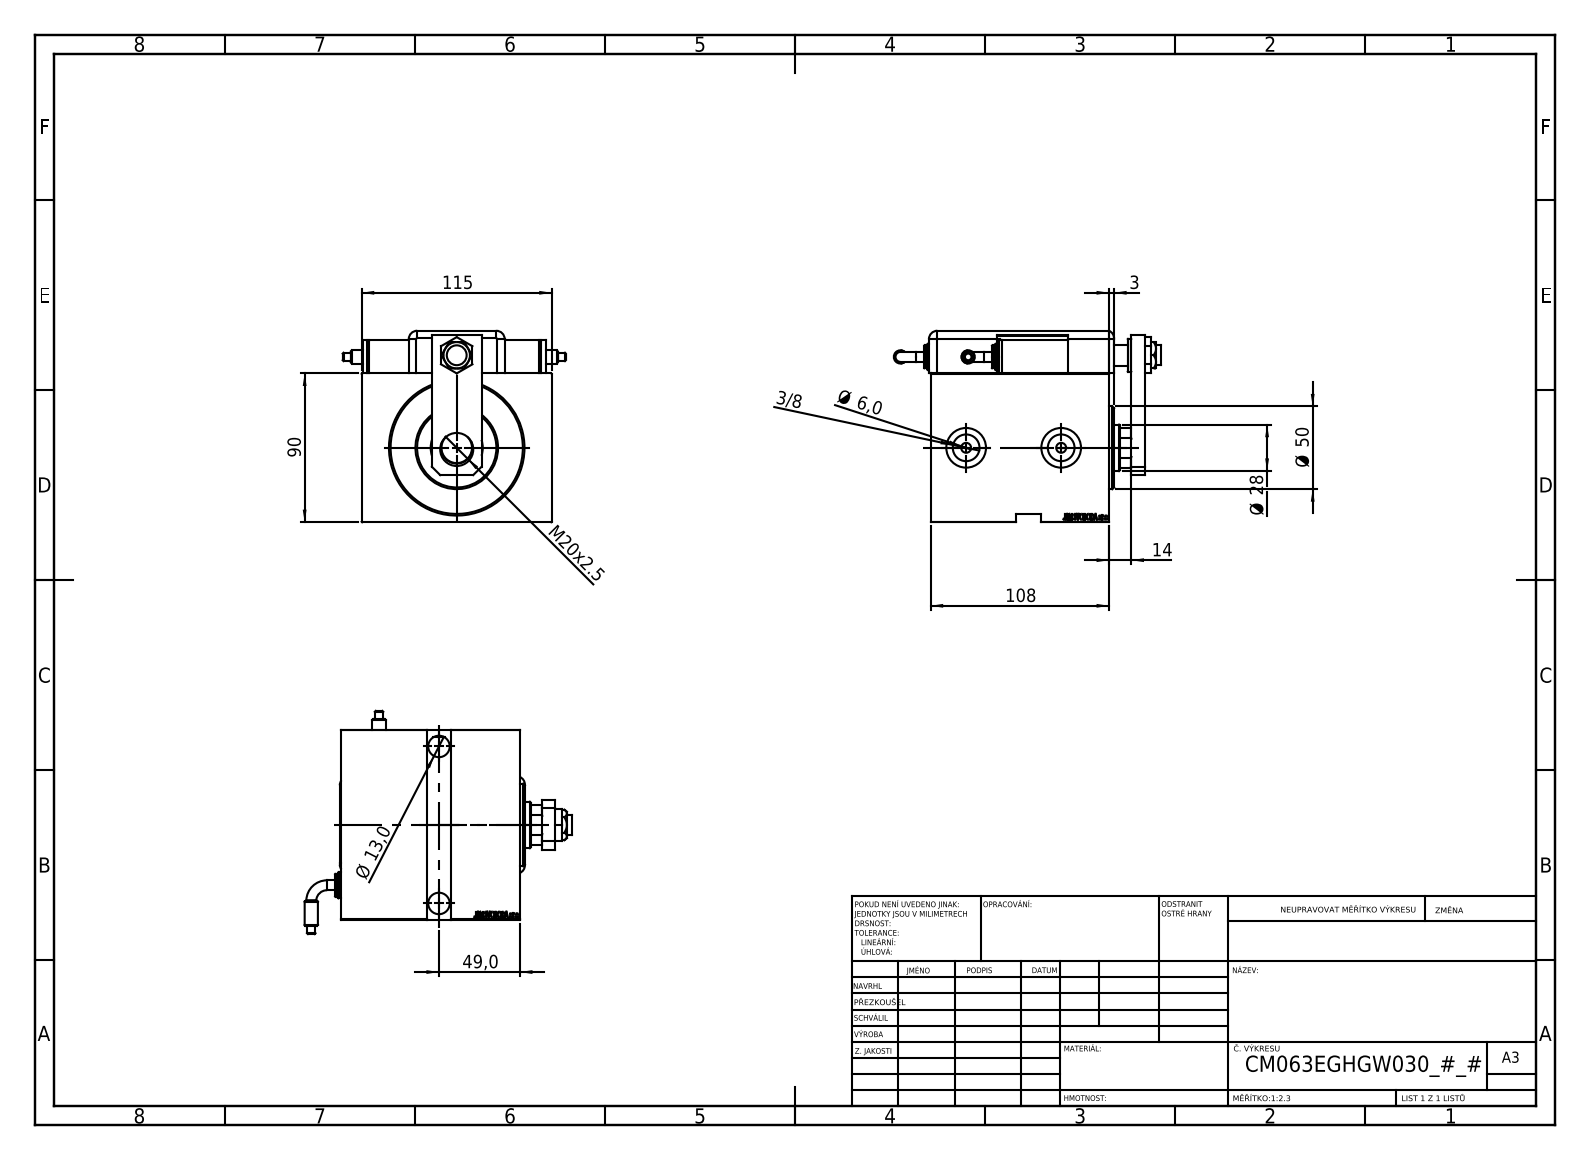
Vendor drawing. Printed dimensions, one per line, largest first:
115
108
90
Ø 50
49,0
Ø 28
M20x2.5
14
Ø 13,0
Ø 6,0
3
3/8
